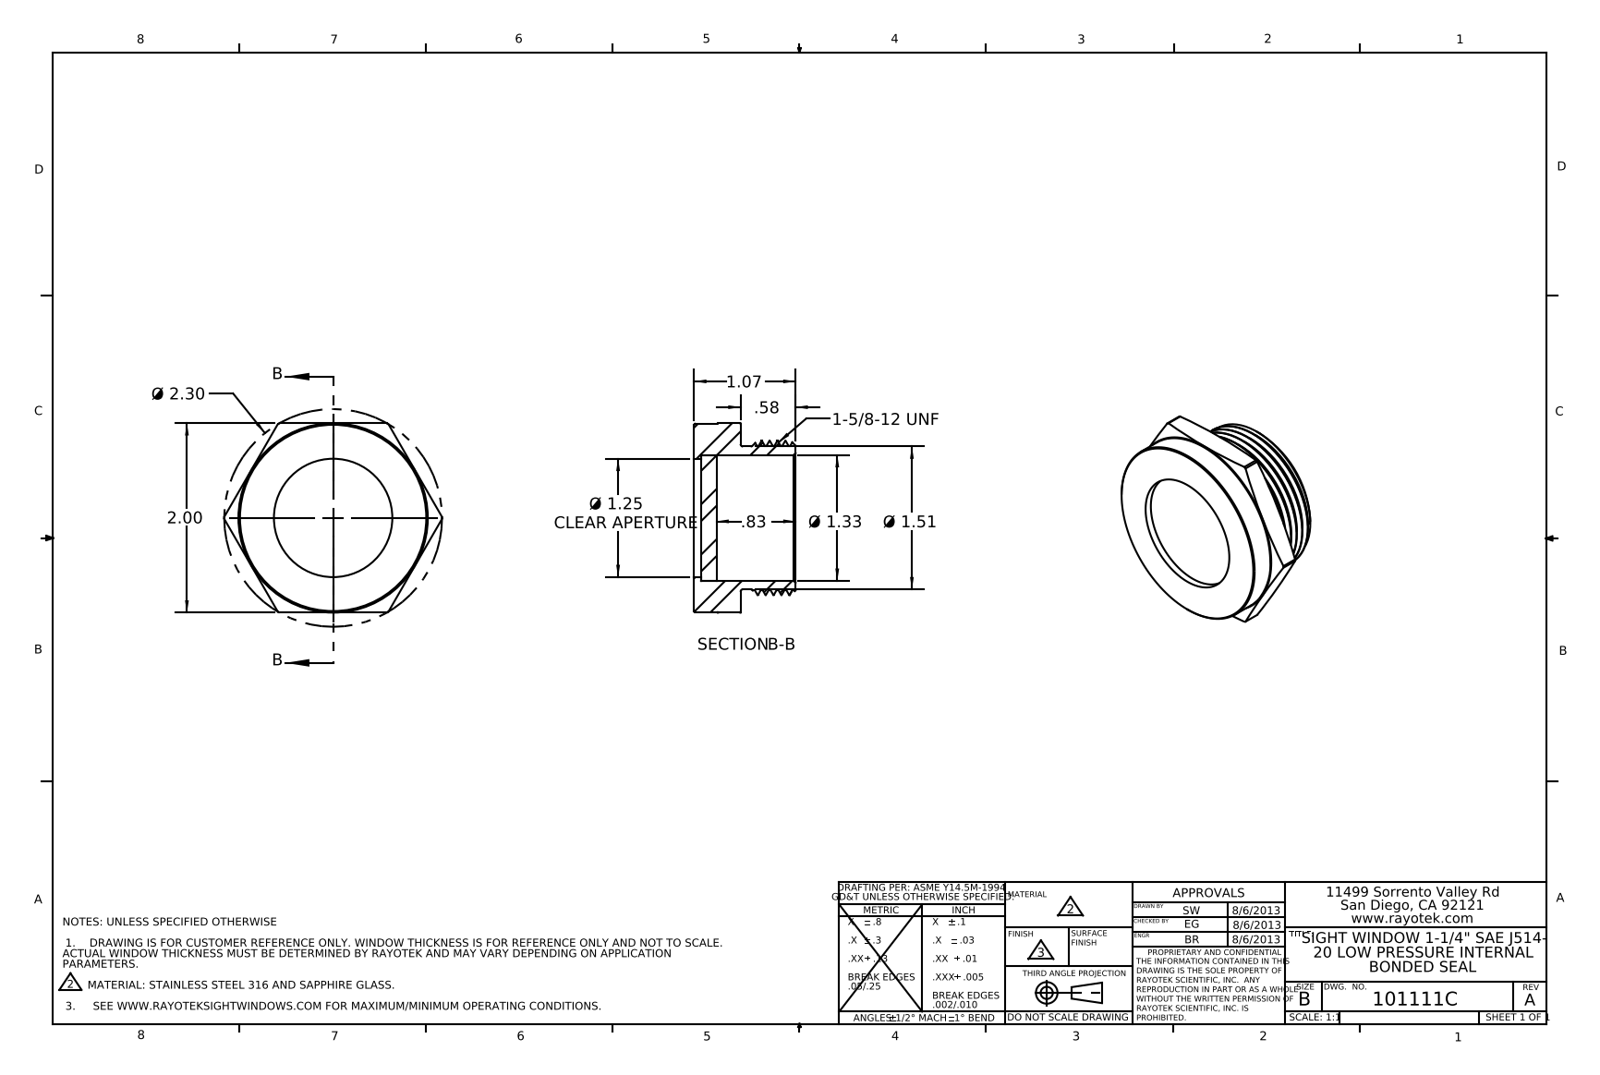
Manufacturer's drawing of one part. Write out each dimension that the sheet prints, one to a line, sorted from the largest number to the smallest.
Ø 2.30
2.00
Ø 1.51
Ø 1.33
Ø 1.25 CLEAR APERTURE
1.07
.83
.58
